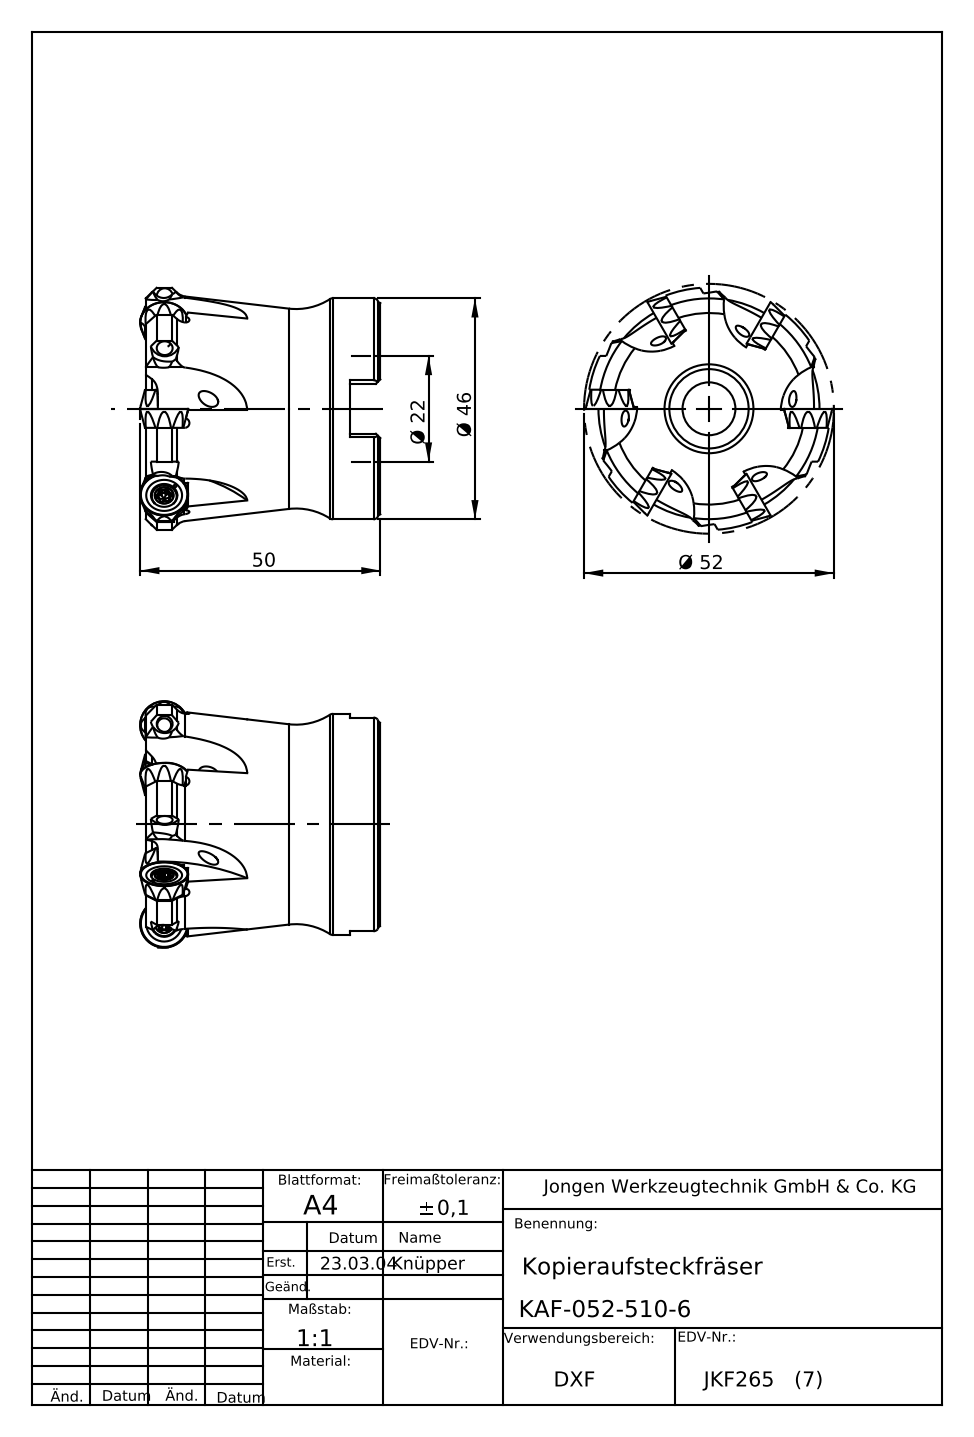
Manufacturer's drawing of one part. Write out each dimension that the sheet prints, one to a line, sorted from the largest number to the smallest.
Ø 52
50
Ø 46
Ø 22
